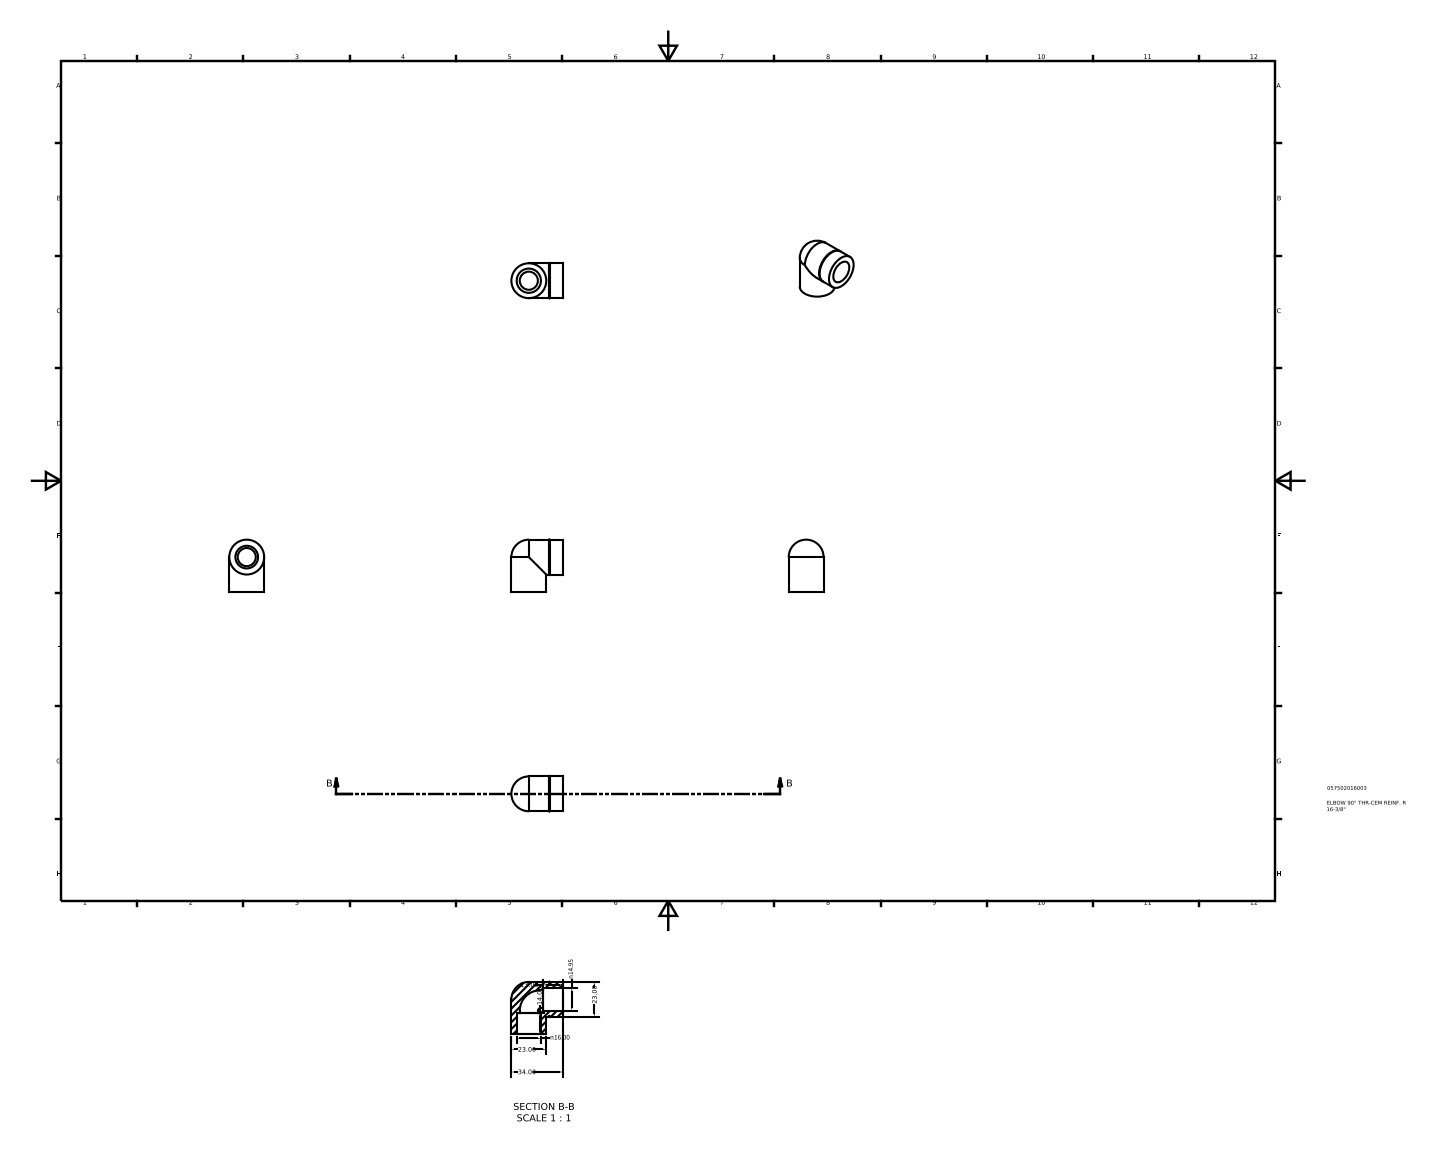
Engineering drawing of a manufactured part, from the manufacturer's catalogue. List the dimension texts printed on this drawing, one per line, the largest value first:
34.00
23.00
23.00
n16.00
n14.95
14.00
13.00
